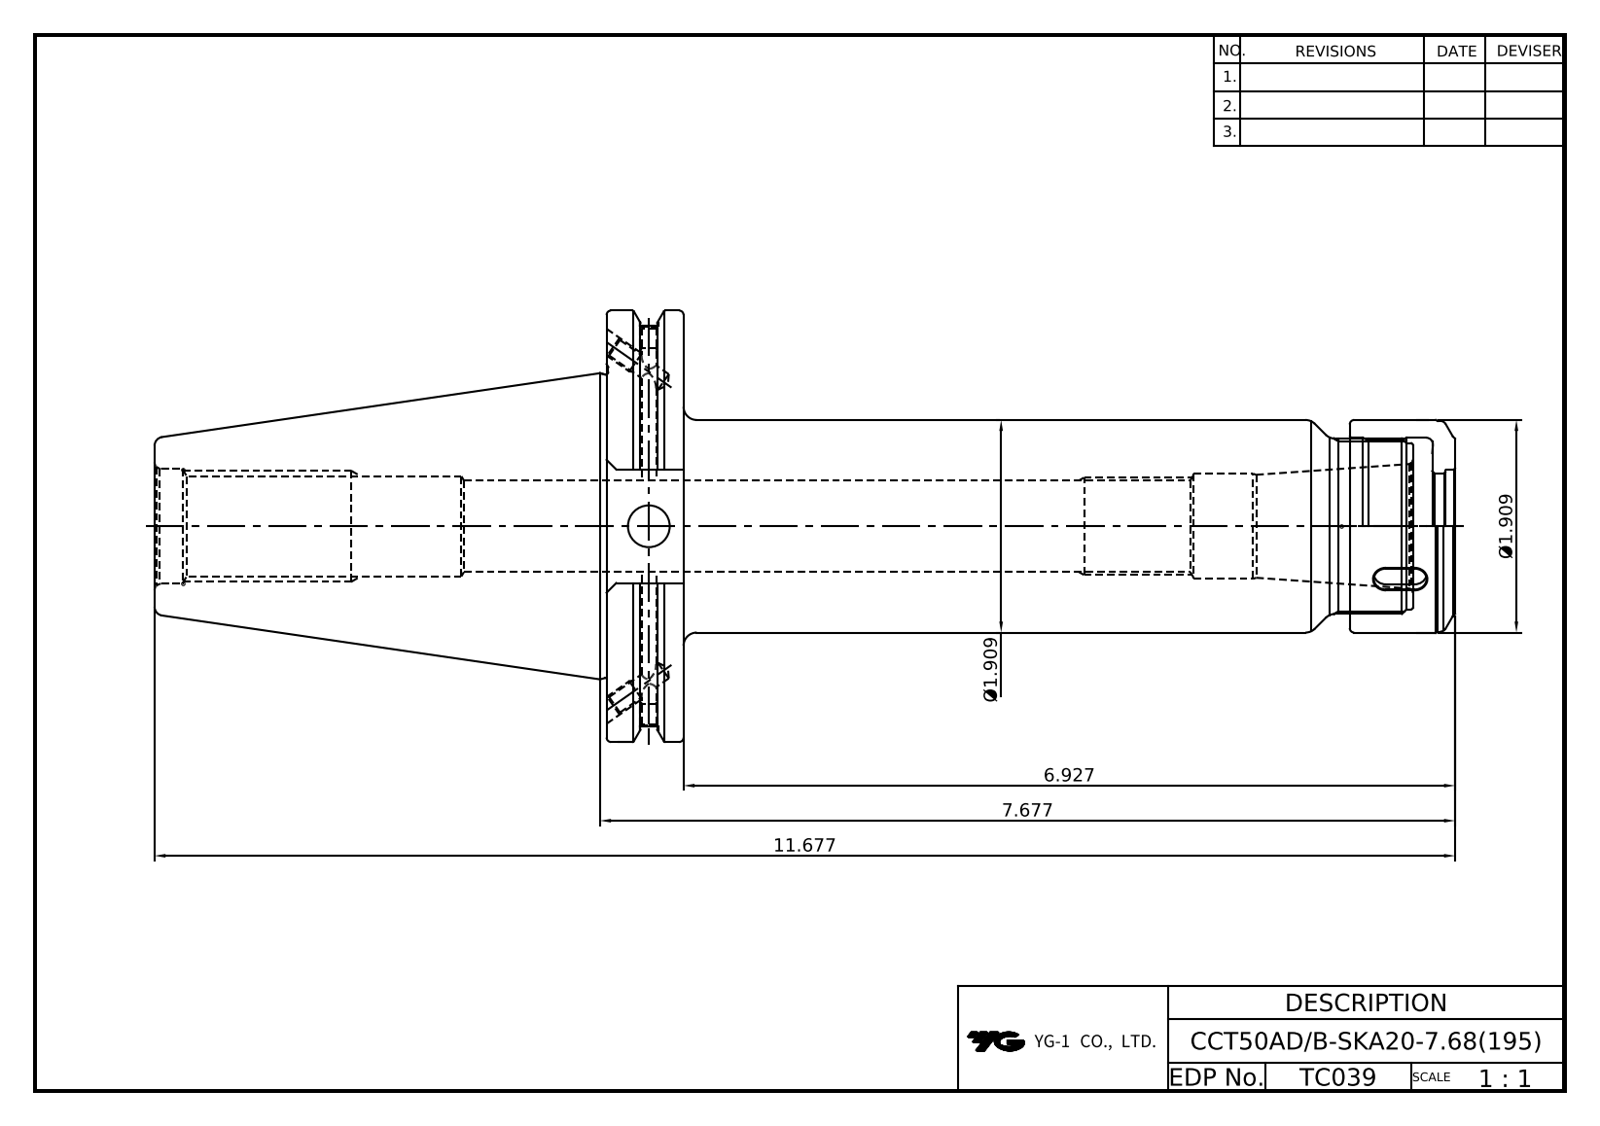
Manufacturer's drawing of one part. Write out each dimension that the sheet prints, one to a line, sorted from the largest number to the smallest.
11.677
7.677
6.927
Ø1.909
Ø1.909
